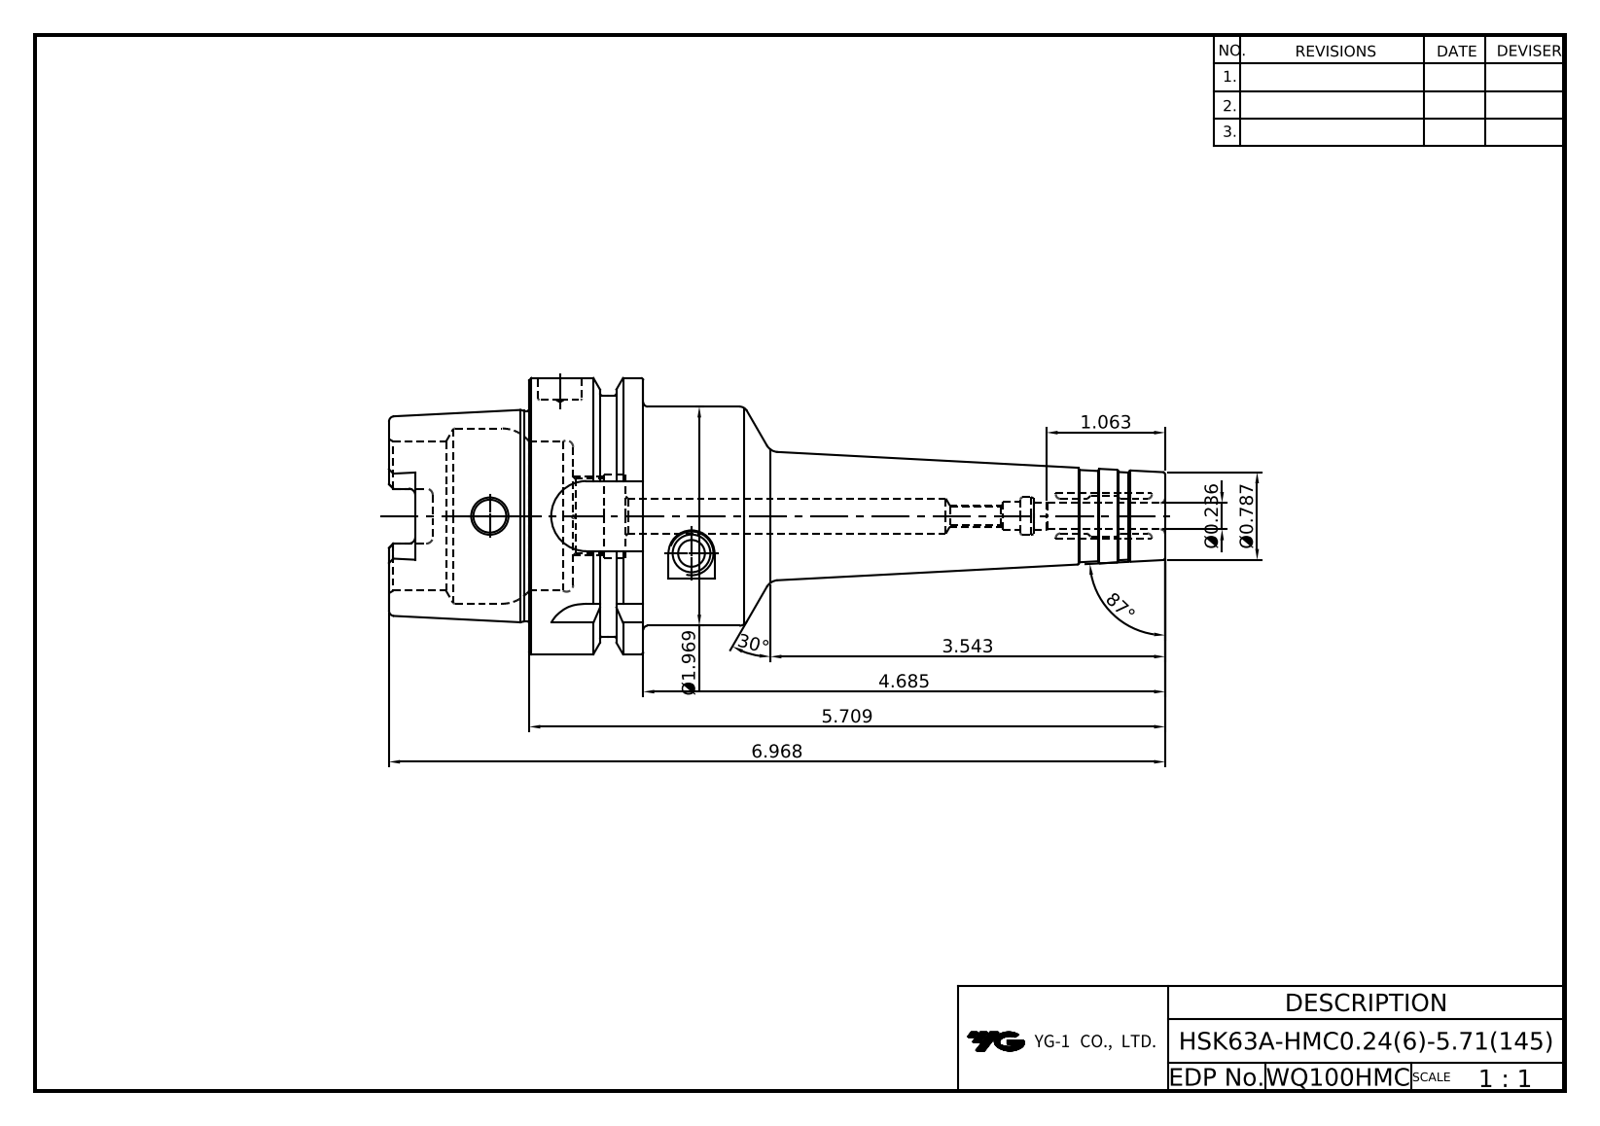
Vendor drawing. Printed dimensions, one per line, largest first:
87°
30°
6.968
5.709
4.685
3.543
Ø1.969
1.063
Ø0.787
Ø0.236
